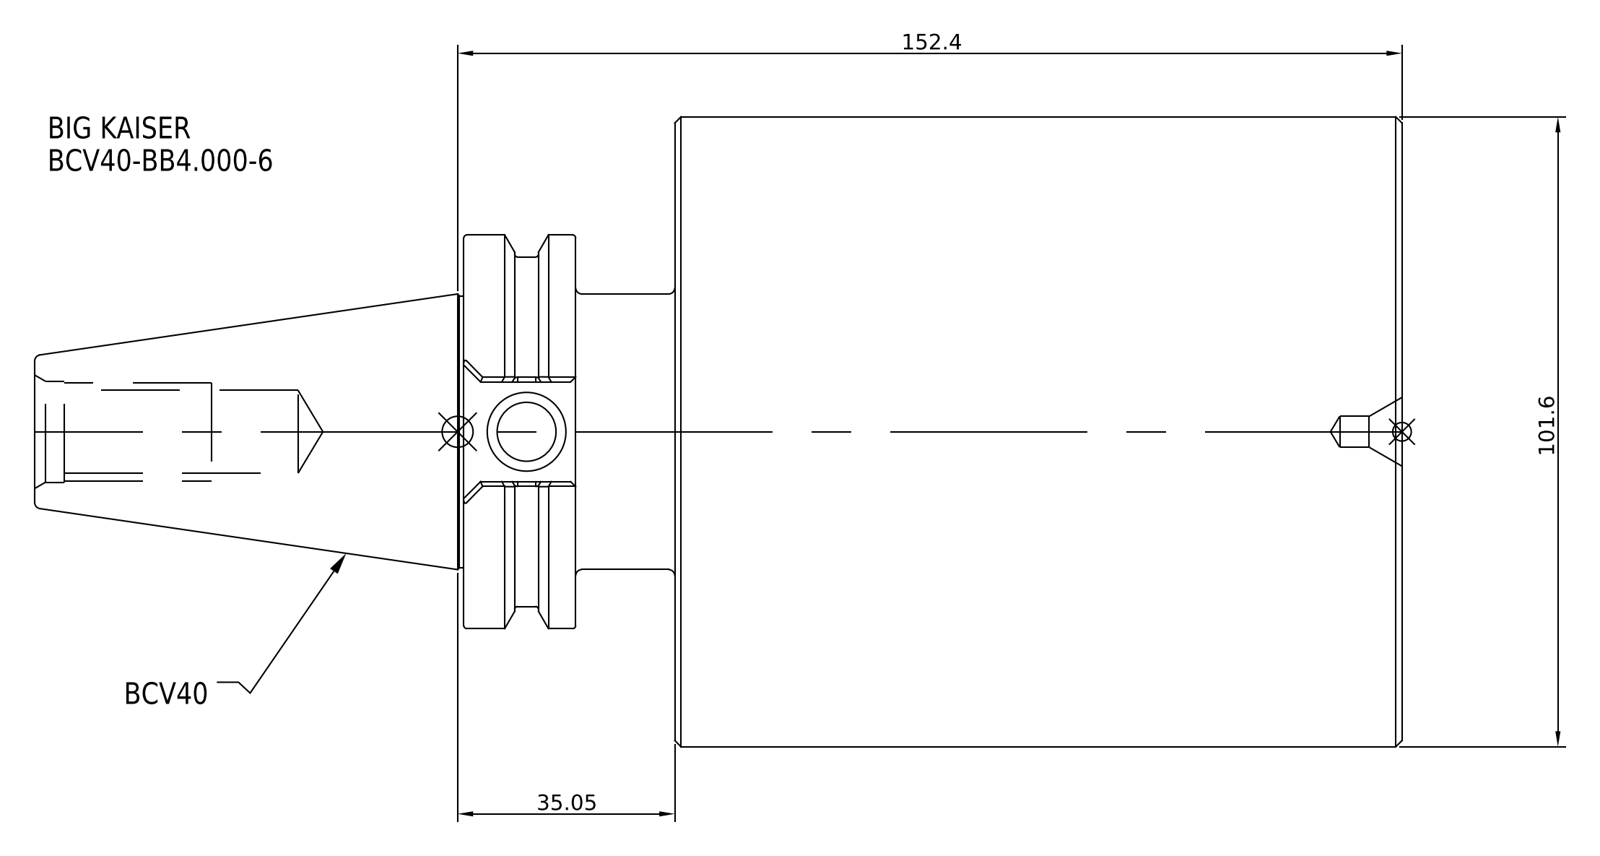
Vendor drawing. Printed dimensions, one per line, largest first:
152.4
101.6
35.05
